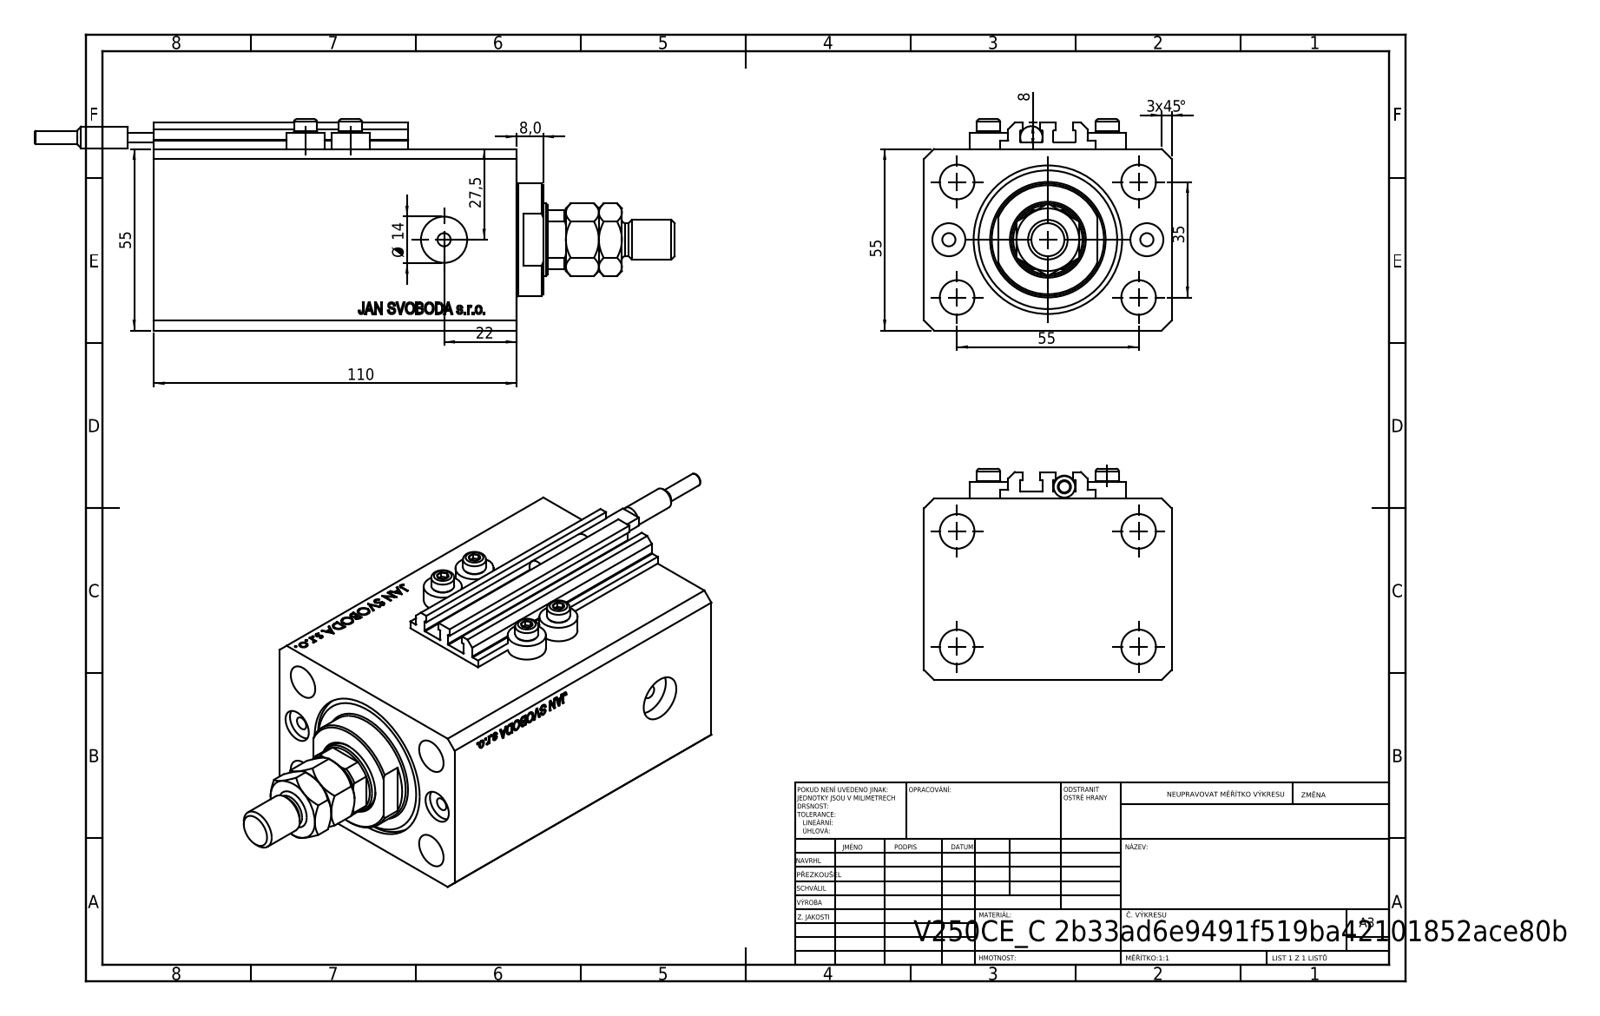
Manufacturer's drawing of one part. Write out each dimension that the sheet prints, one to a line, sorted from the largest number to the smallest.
110
55
55
55
3 x45 °
35
27,5
22
Ø 14
8
8,0
